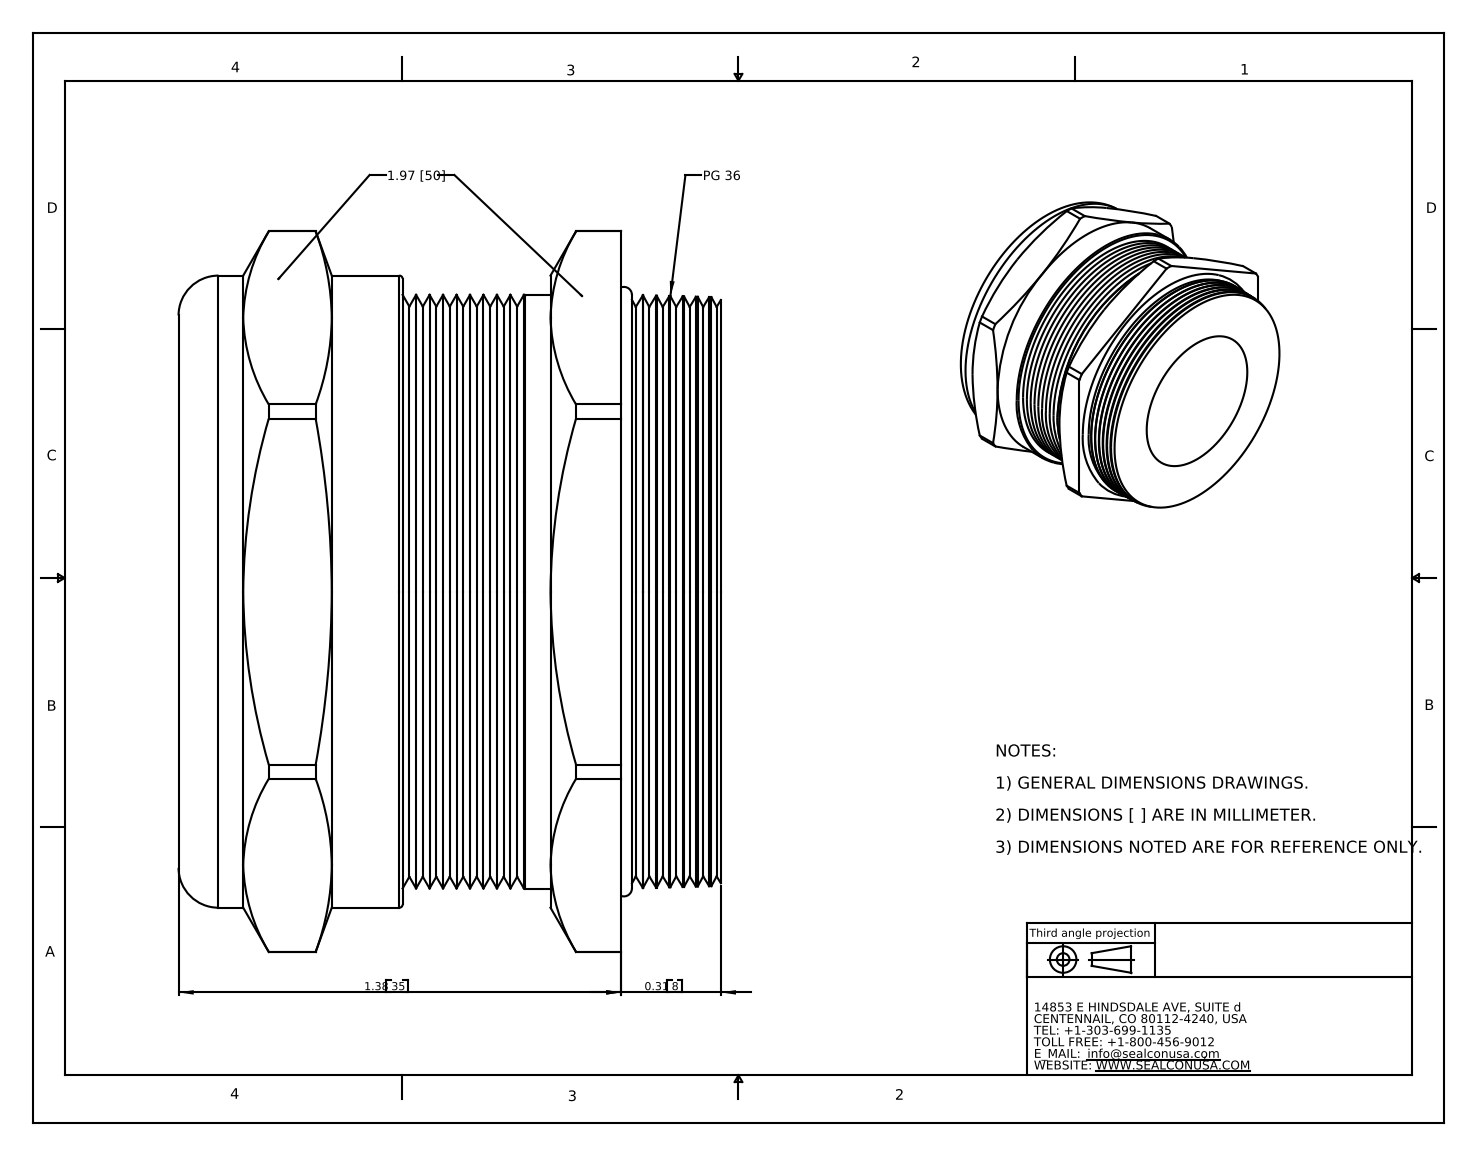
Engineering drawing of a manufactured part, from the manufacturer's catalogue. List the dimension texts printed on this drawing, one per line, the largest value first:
1.38 35
0.31 8
